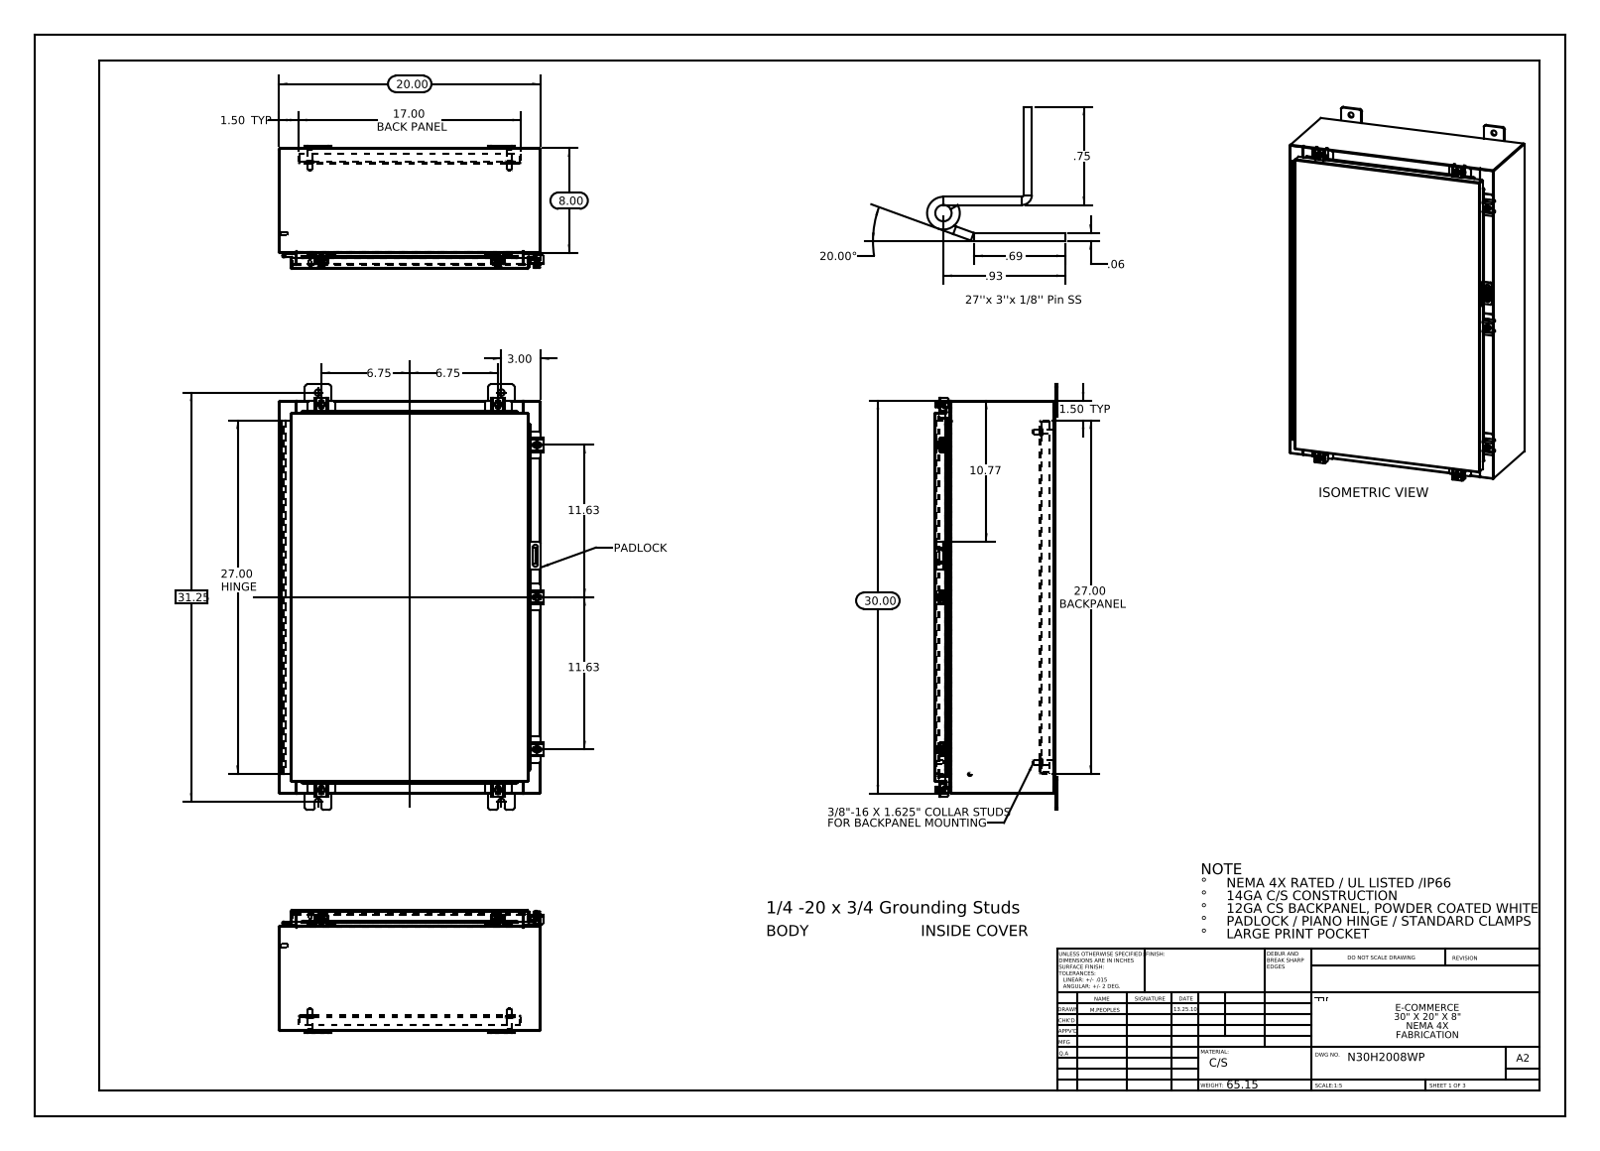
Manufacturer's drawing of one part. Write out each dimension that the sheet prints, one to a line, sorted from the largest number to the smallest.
31.25
30.00
27.00 HINGE
27.00 BACKPANEL
20.00
20.00°
17.00 BACK PANEL
11.63
11.63
10.77
8.00
6.75
6.75
3.00
1.50 TYP
1.50 TYP
.93
.75
.69
.06
